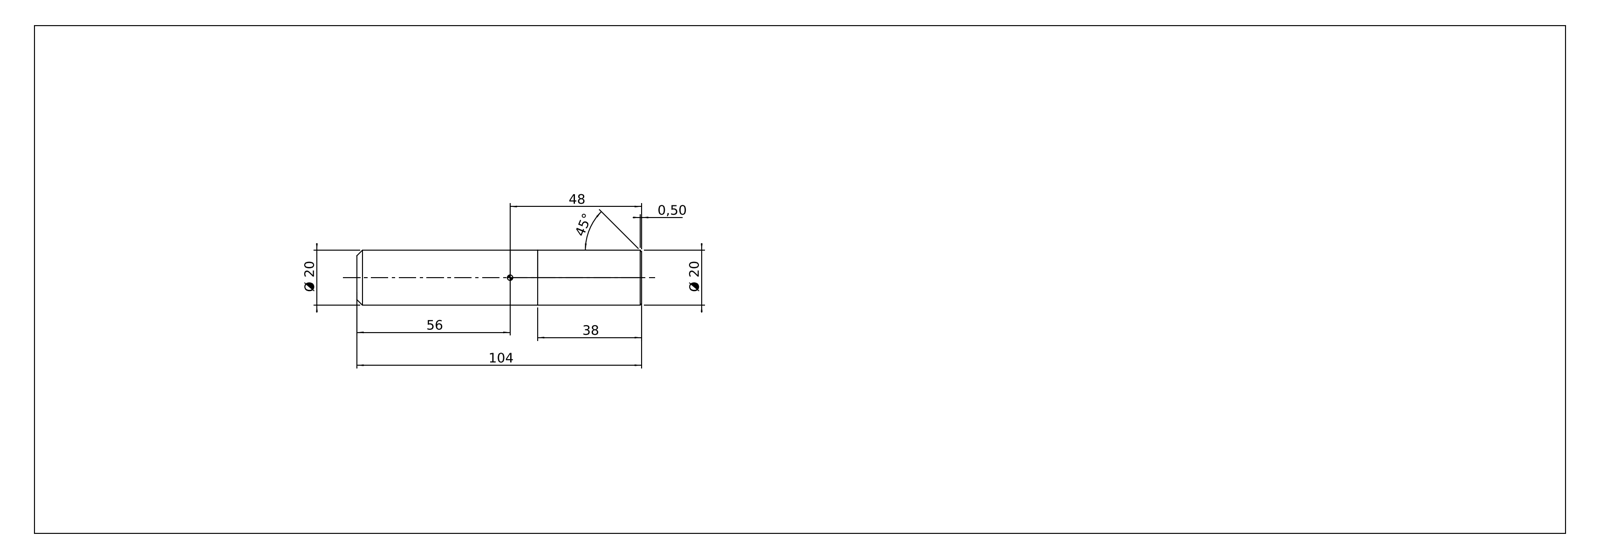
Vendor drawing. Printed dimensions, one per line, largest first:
104
56
48
45°
38
Ø 20
Ø 20
0,50
